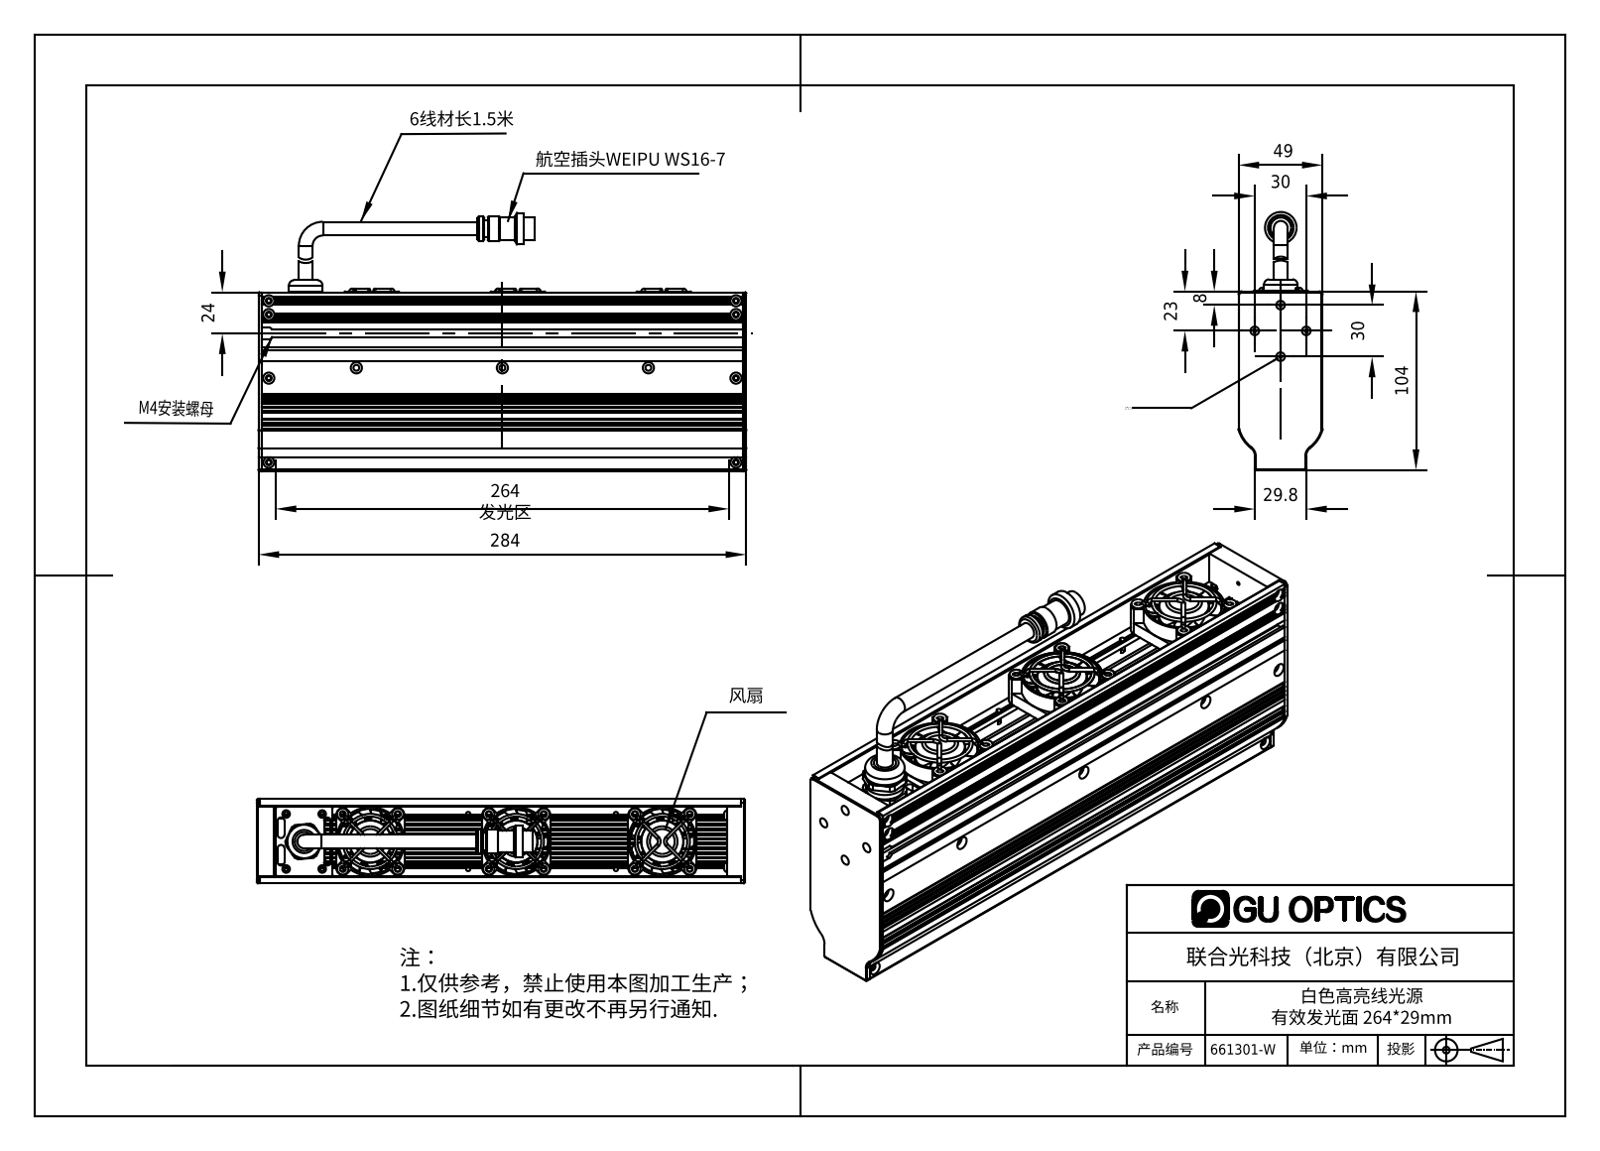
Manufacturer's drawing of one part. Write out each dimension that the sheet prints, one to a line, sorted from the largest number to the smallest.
284
264 发光区
104
49
30
30
29.8
24
23
8
8 x ∅2 x 9 M6 - 6H x 6
